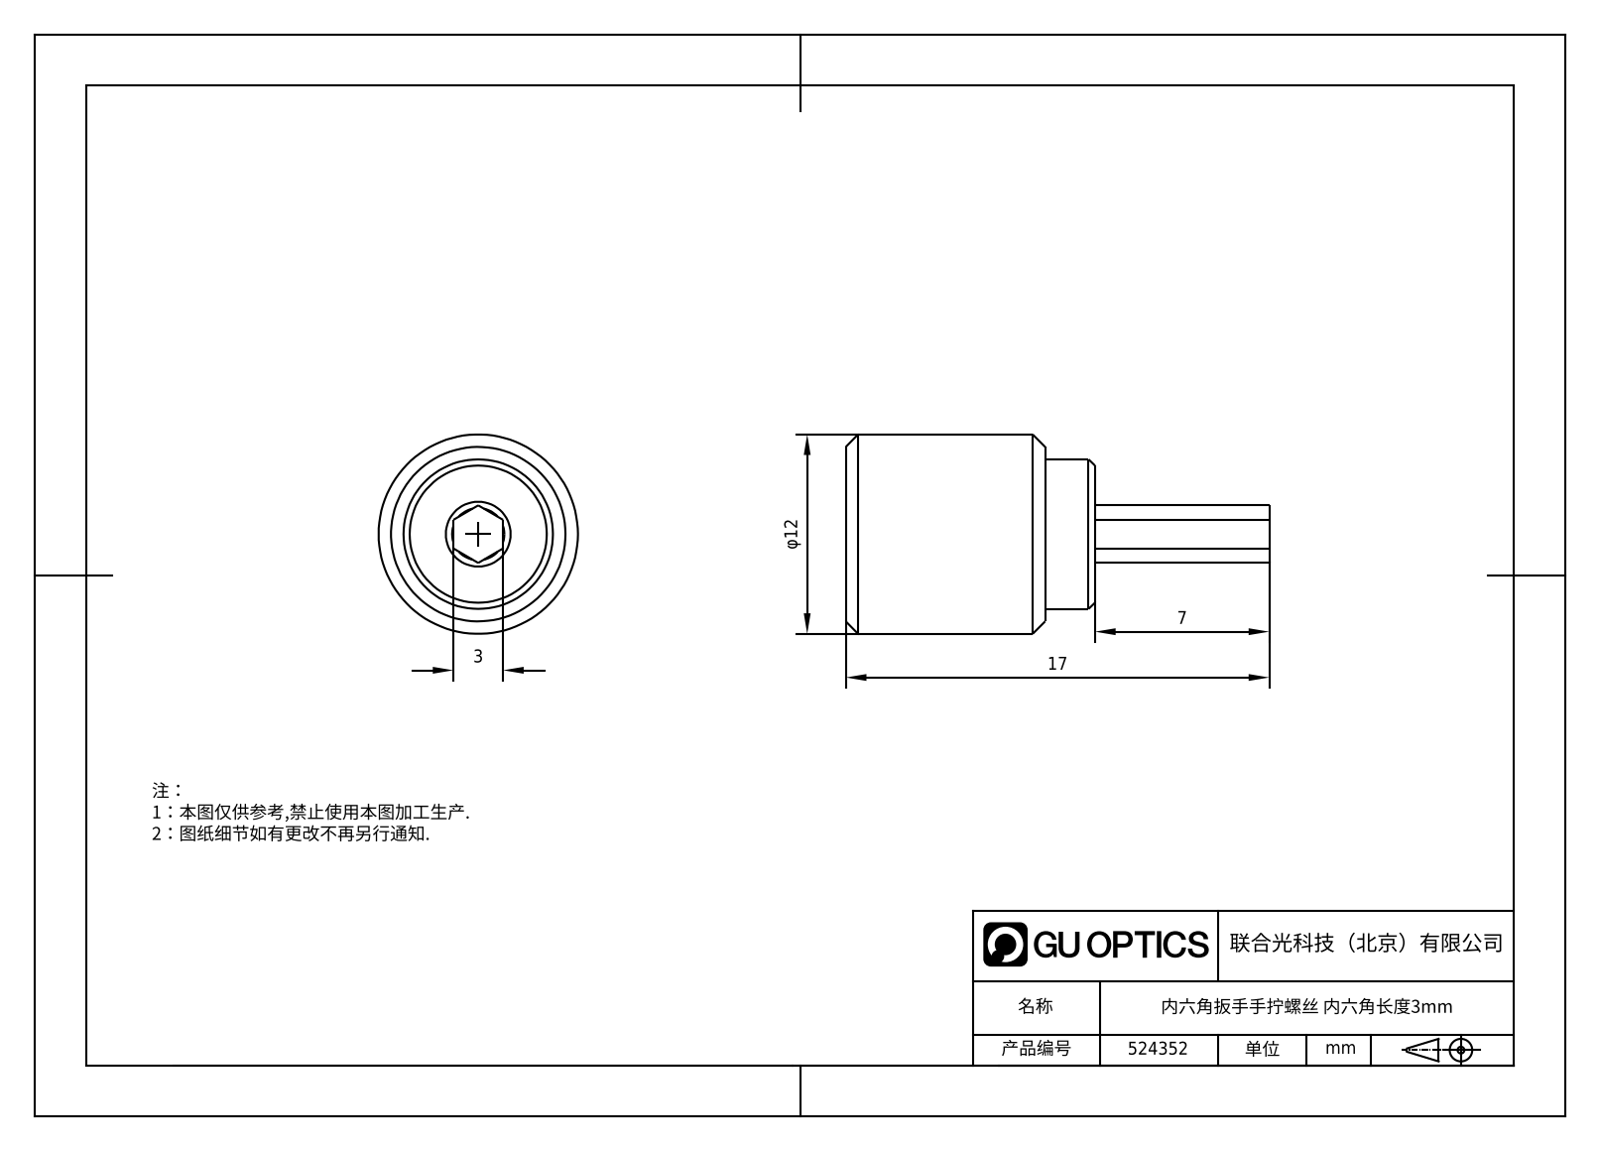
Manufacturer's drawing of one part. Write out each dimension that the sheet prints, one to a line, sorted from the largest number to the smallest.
17
φ12
7
3
